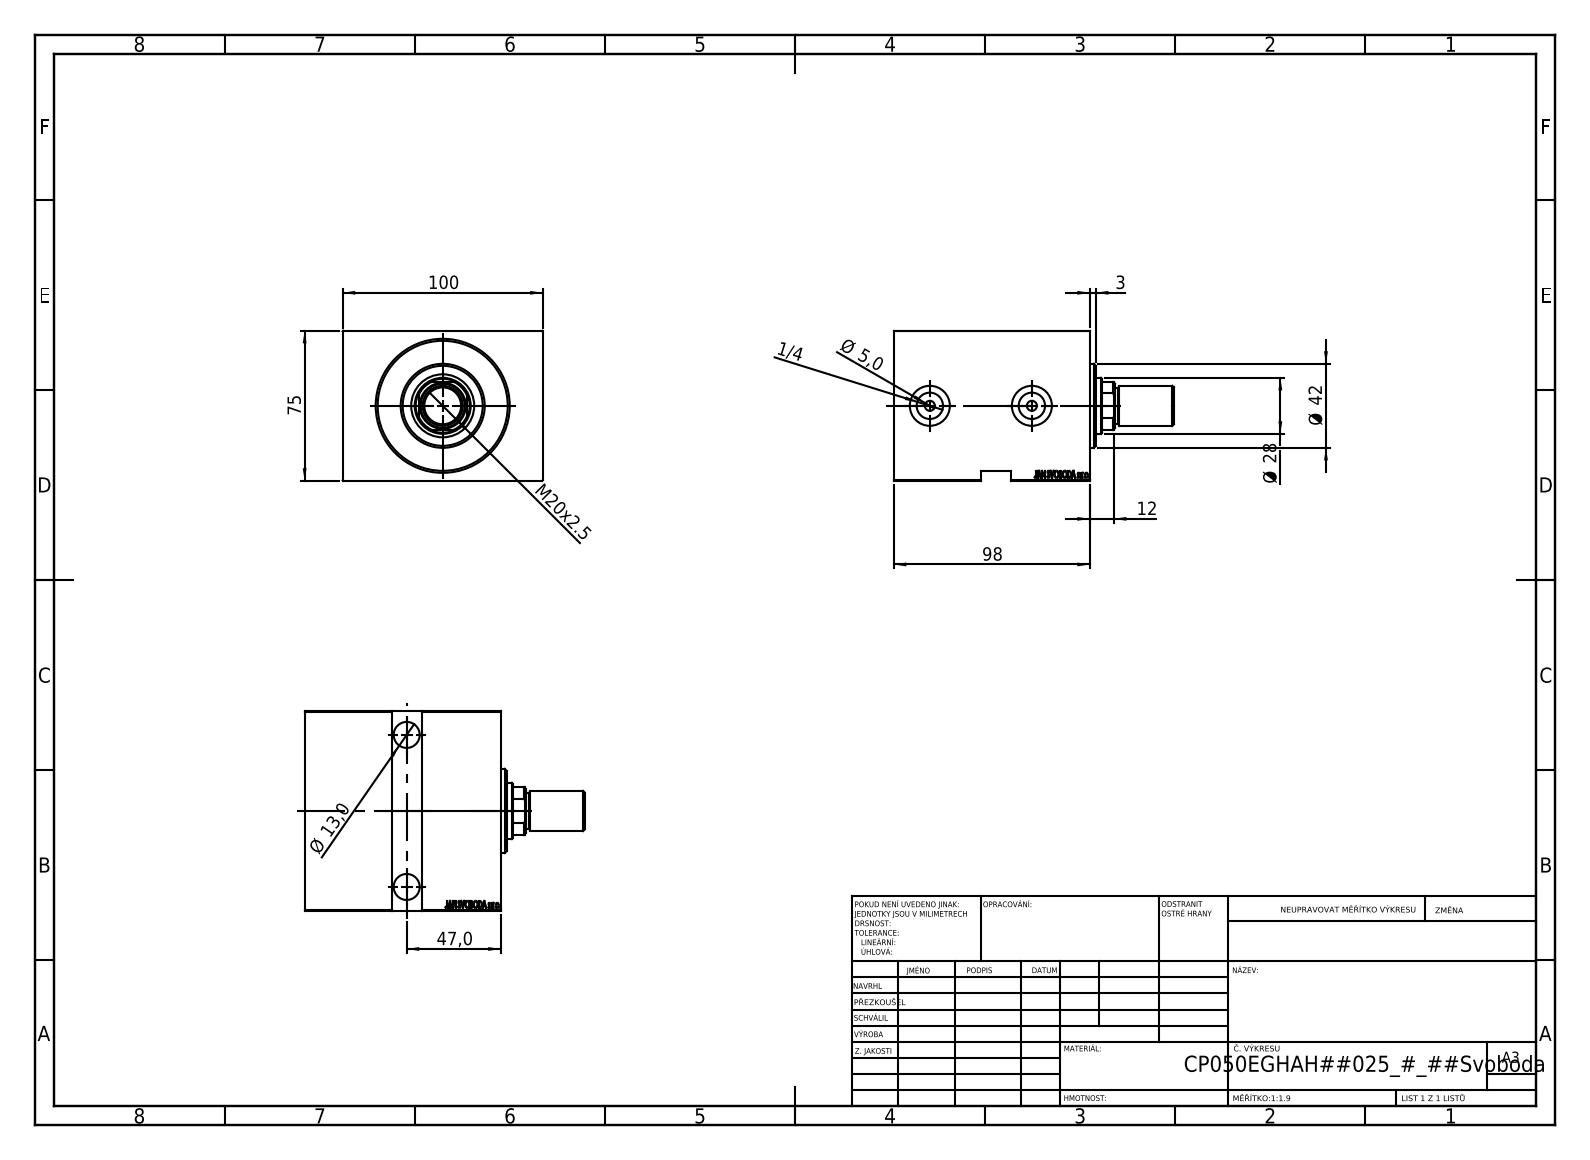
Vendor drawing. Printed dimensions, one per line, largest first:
100
98
75
47,0
Ø 42
Ø 28
M20x2.5
Ø 13,0
12
Ø 5,0
3
1/4
